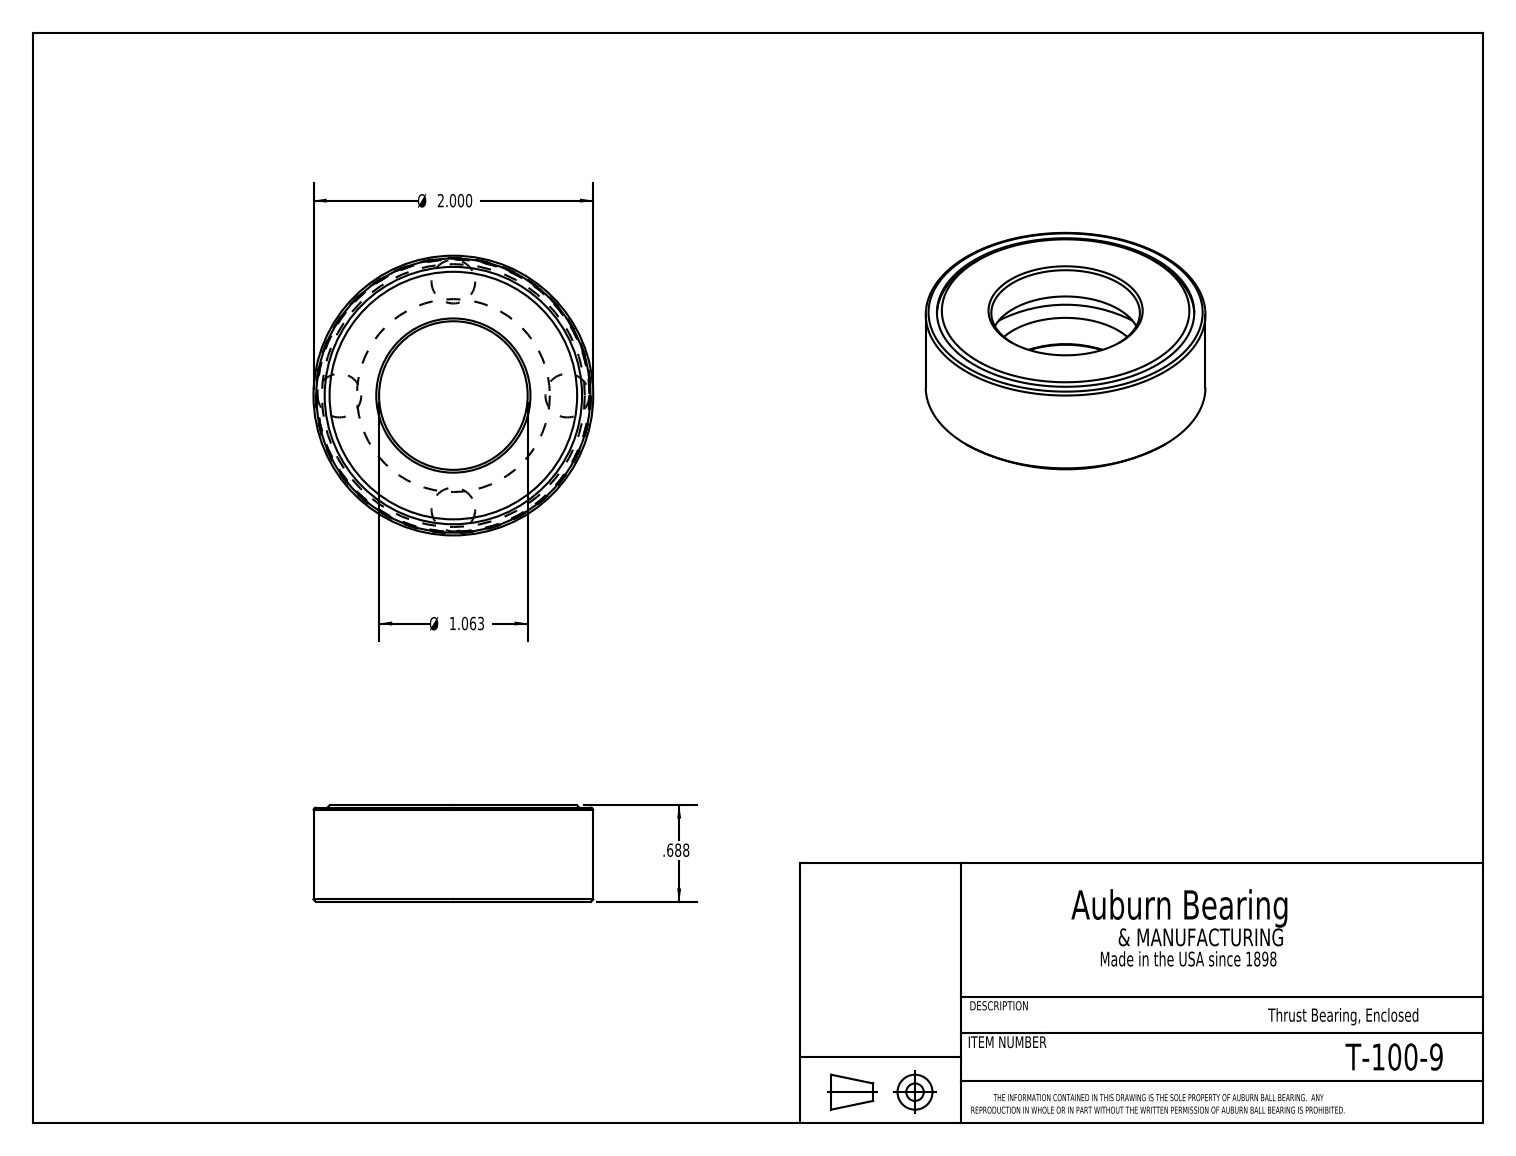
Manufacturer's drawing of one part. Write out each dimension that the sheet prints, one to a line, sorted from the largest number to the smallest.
Ø 2.000
Ø 1.063
.688
